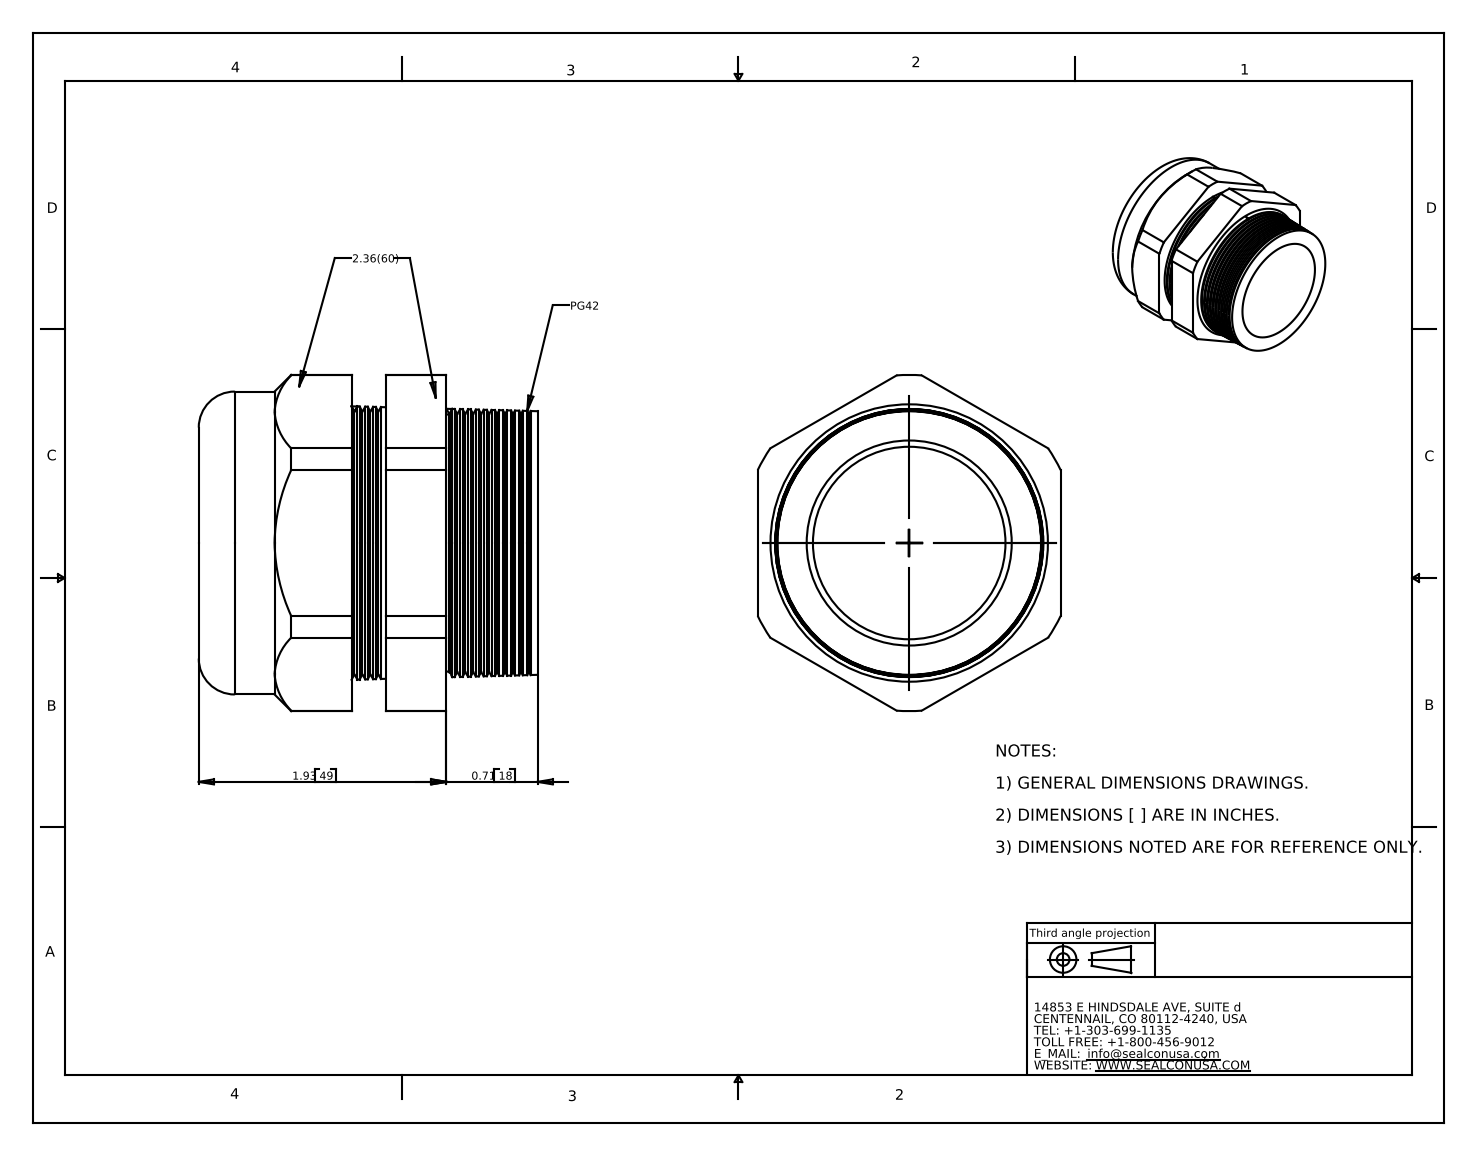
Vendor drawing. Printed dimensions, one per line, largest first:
1.93 49
0.71 18
